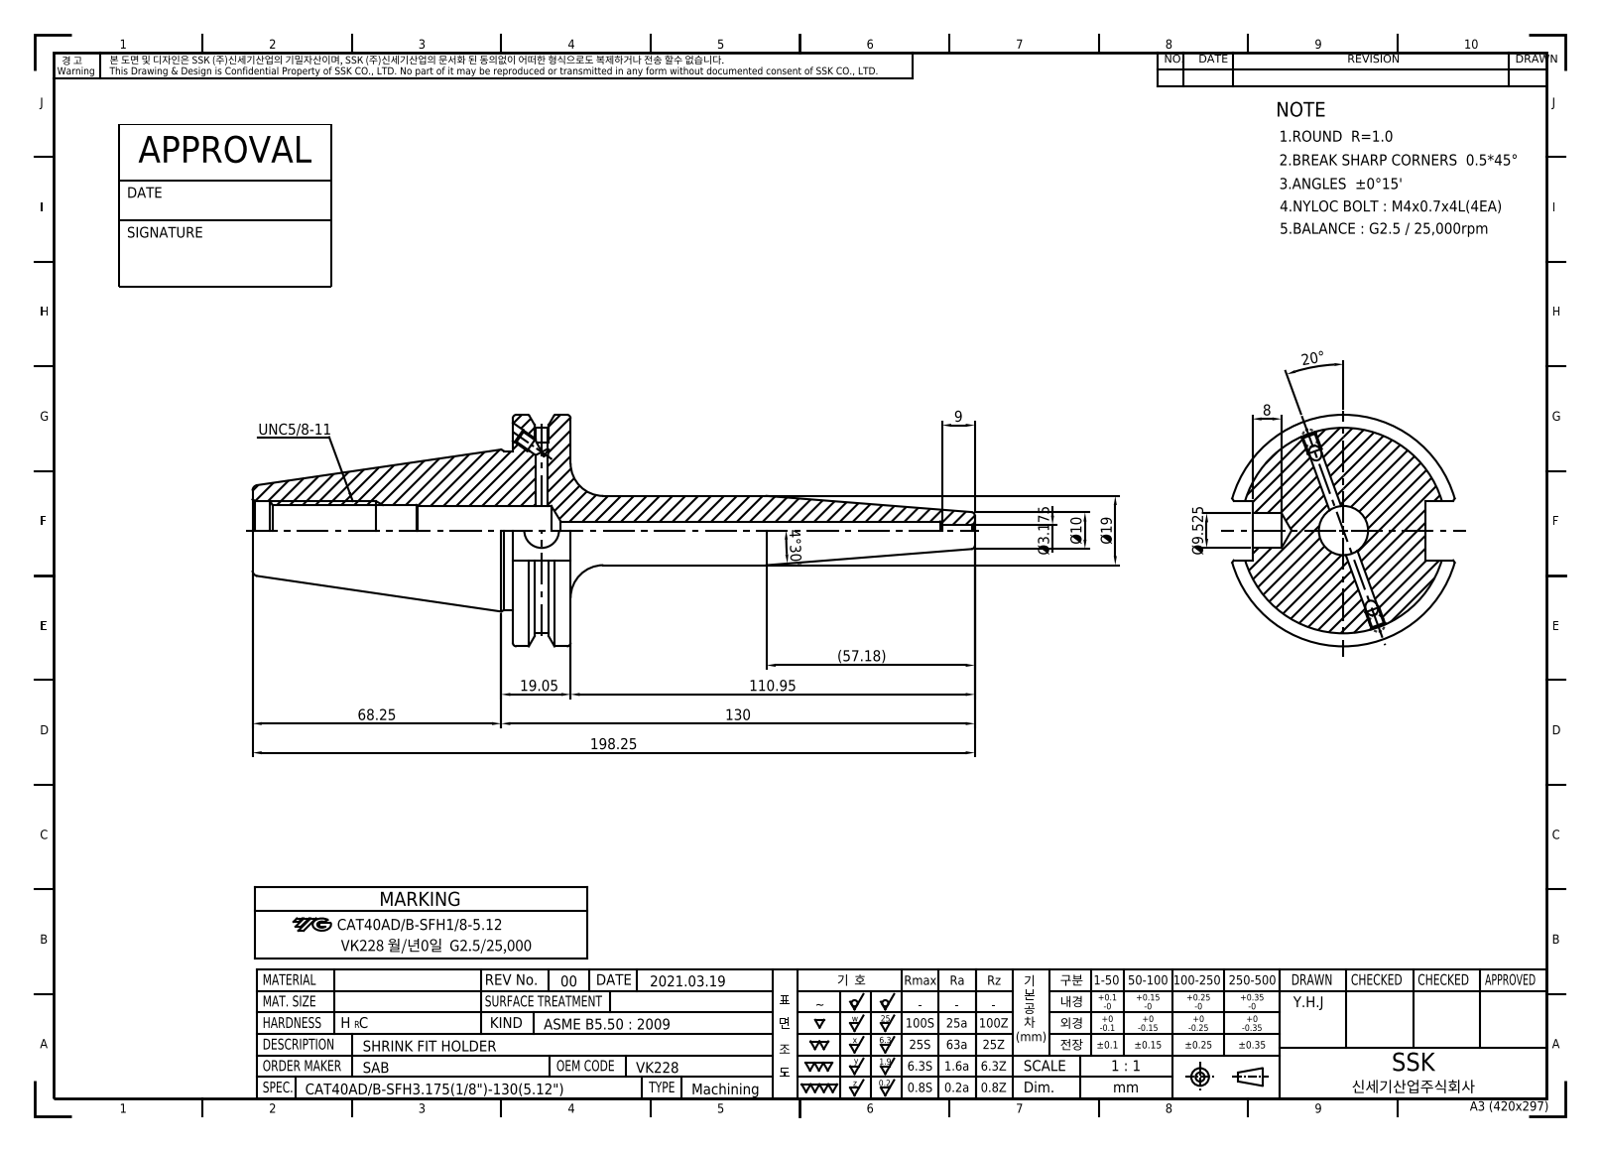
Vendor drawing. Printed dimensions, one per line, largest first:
198.25
130
110.95
68.25
(57.18)
20°
19.05
Ø19
Ø10
Ø9.525
9
8
4°30'
Ø3.175
